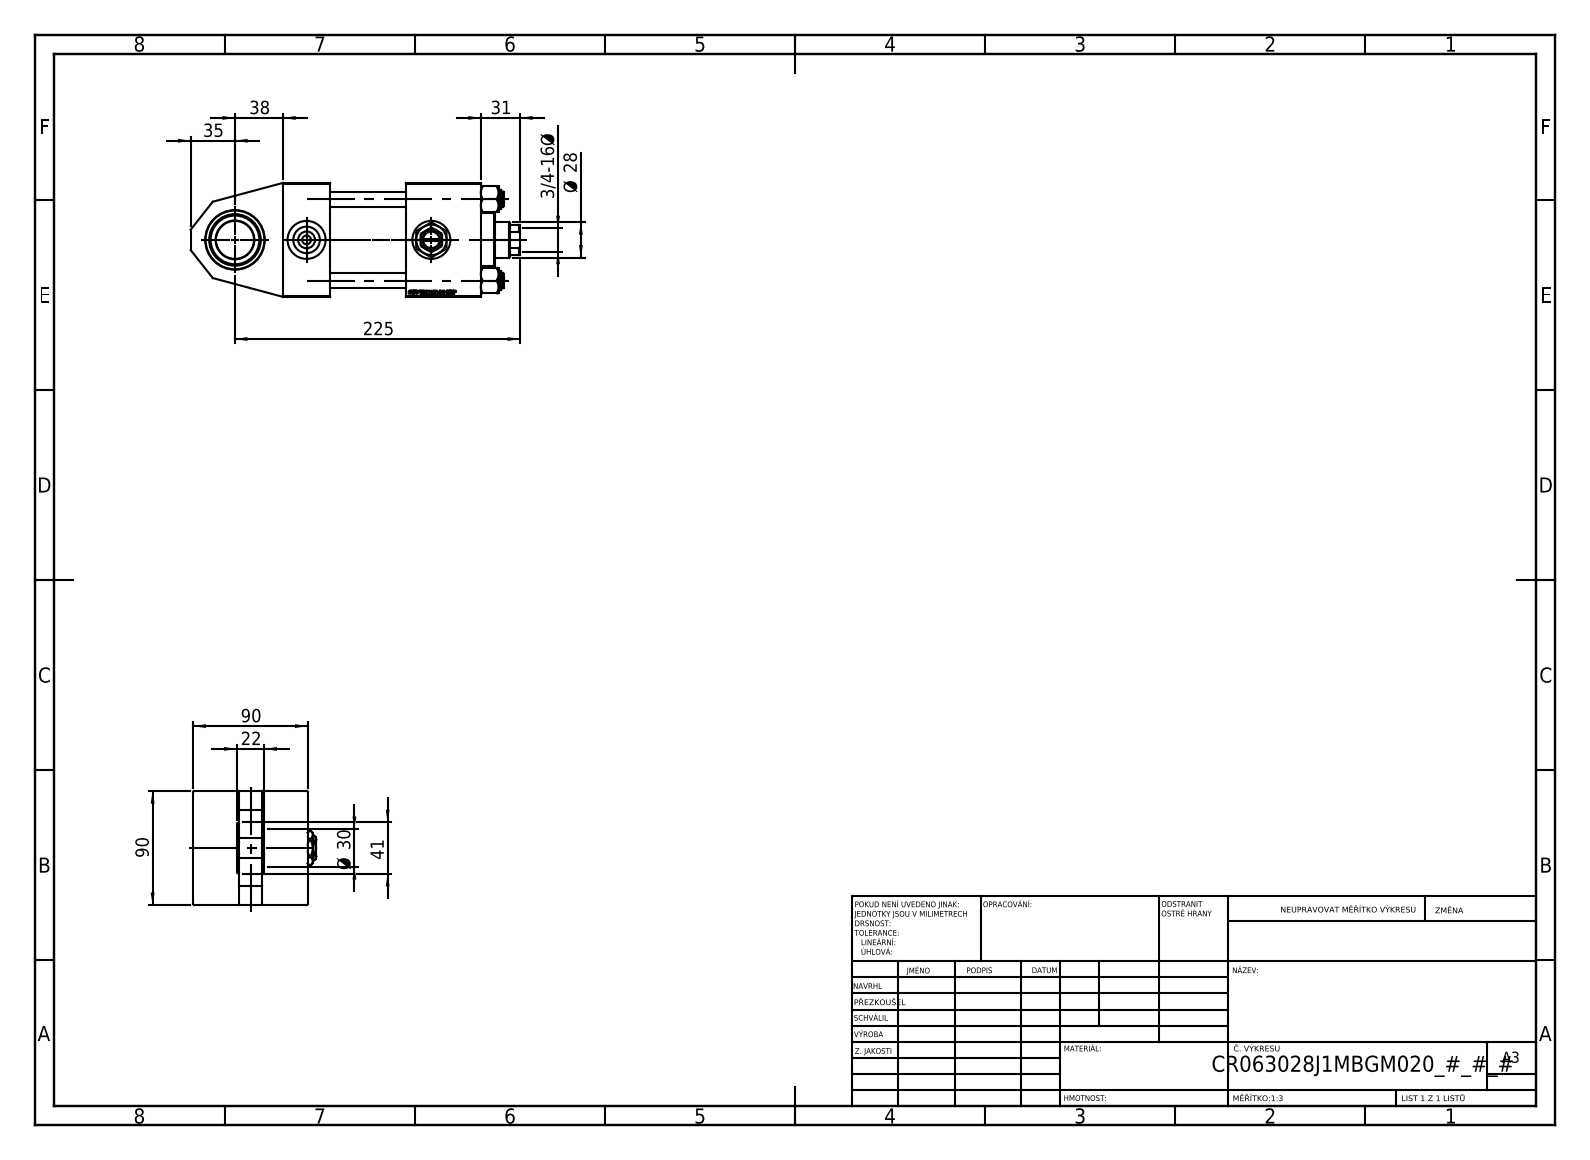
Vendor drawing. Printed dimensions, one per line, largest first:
225
90
90
41
38
35
31
Ø 30
Ø 28
22
3/4-16 Ø
